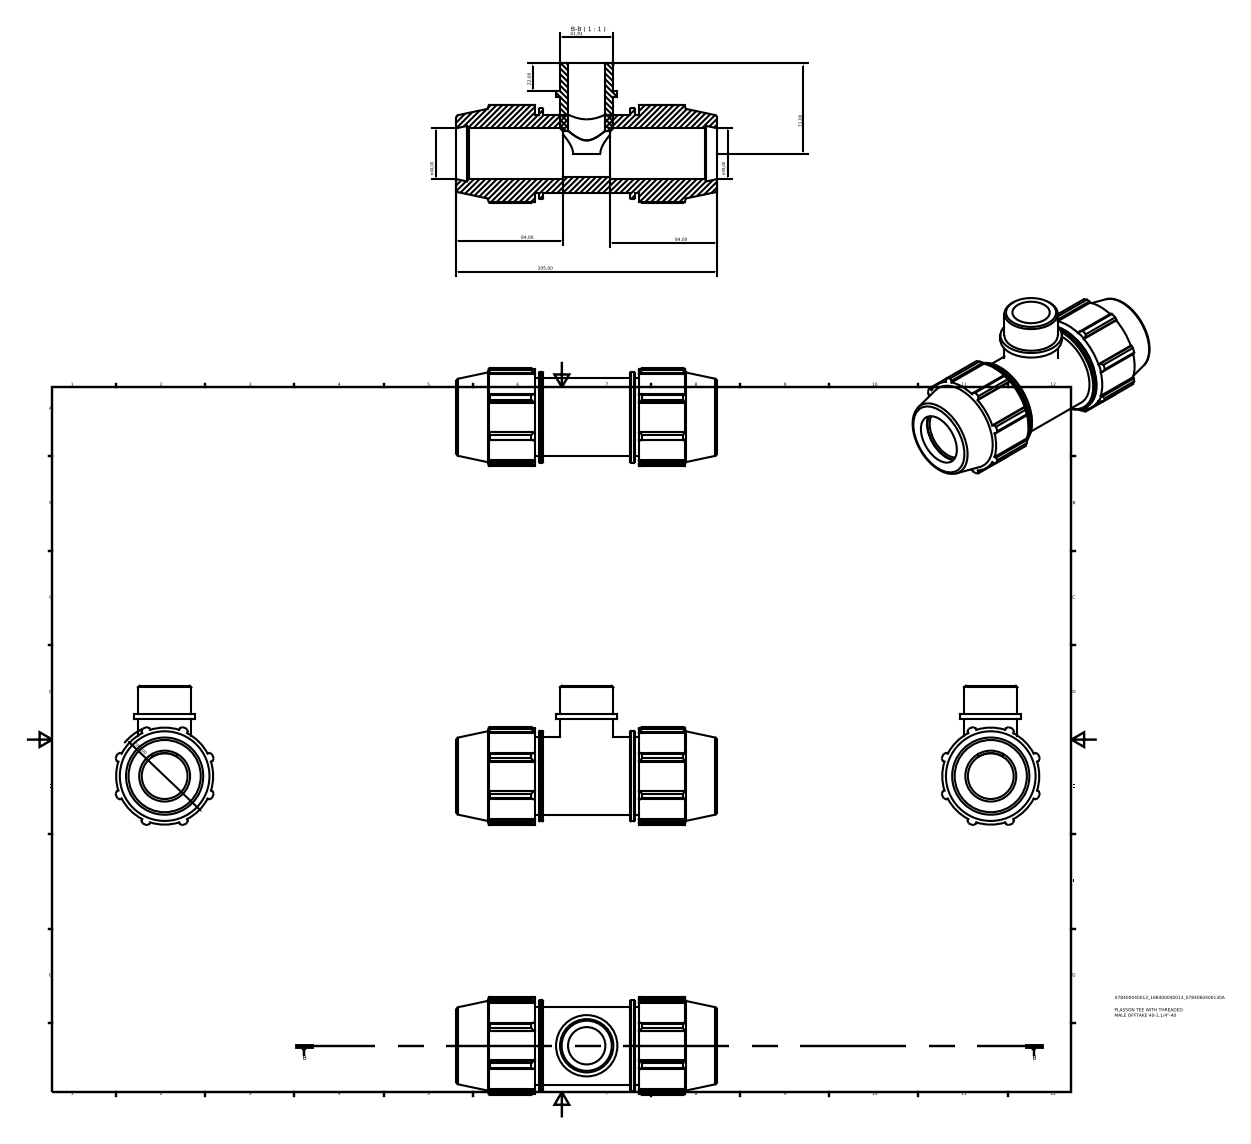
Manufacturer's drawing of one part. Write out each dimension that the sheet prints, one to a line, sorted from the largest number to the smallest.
205,00
84,00
84,00
∅82,00
71,00
41,91
n40,00
n40,00
22,00
